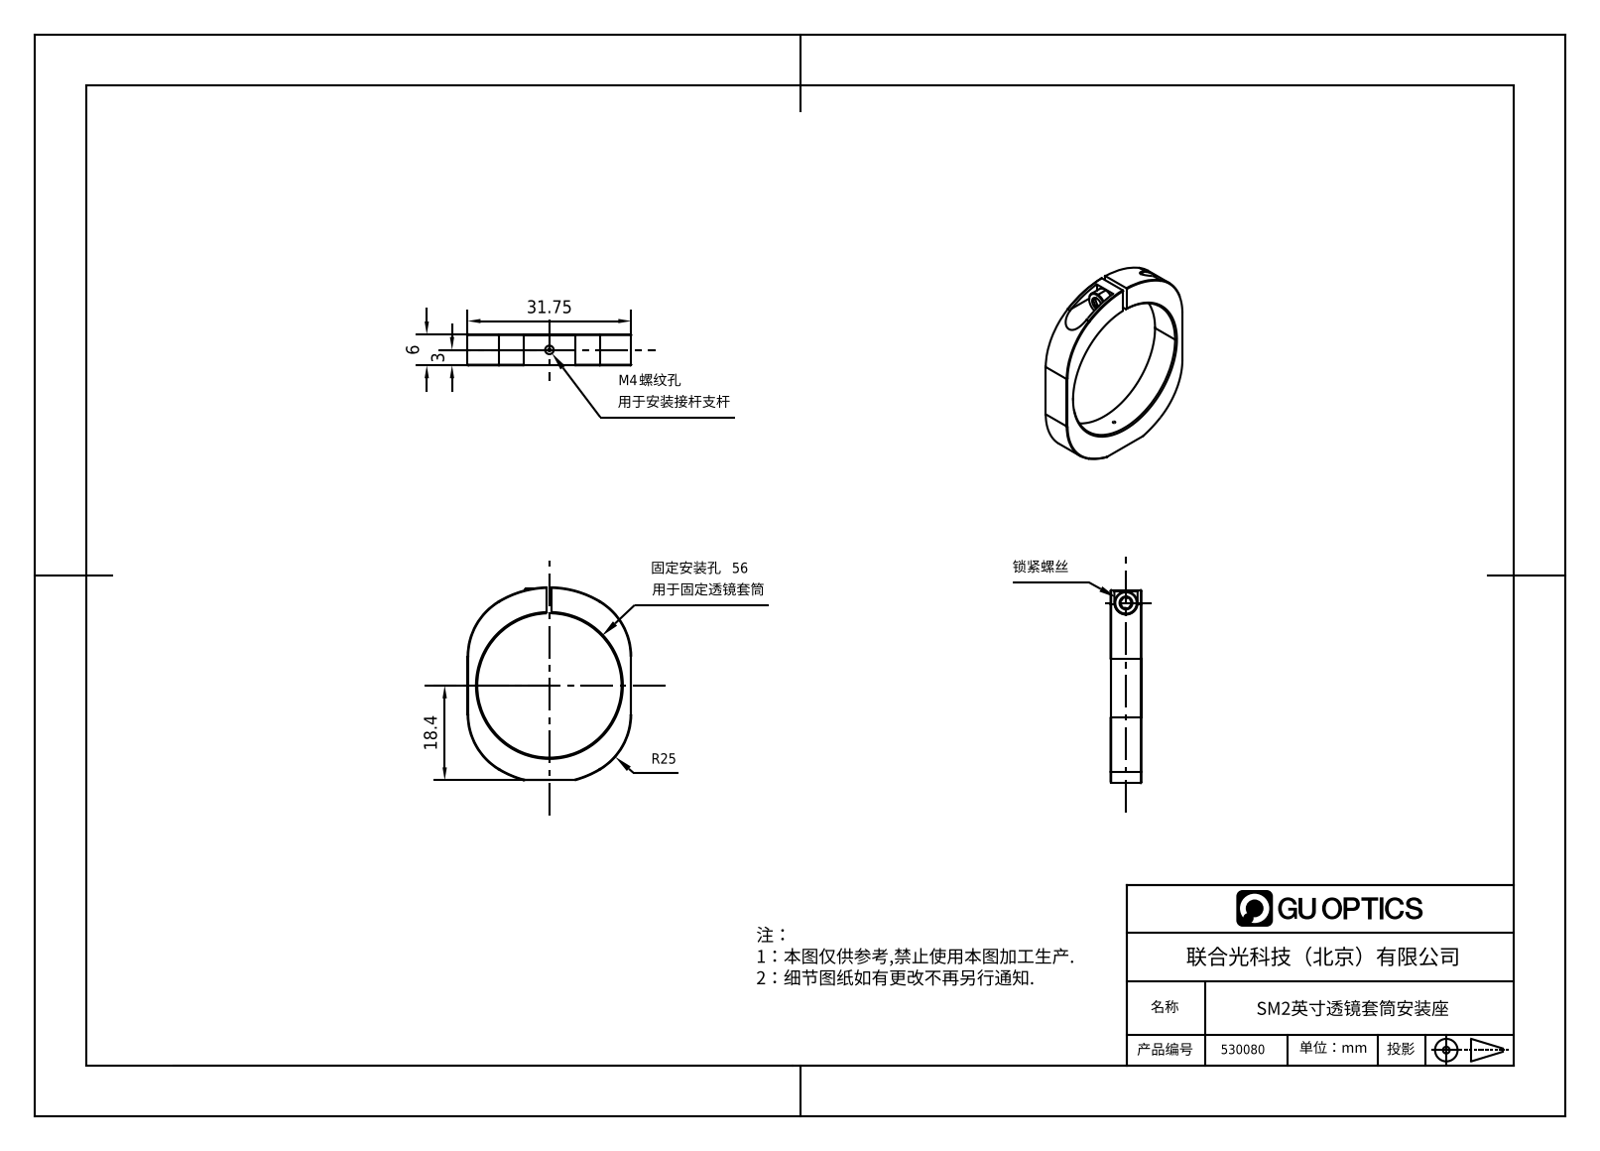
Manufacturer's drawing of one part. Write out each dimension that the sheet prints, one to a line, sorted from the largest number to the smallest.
31.75
18.4
6
3
